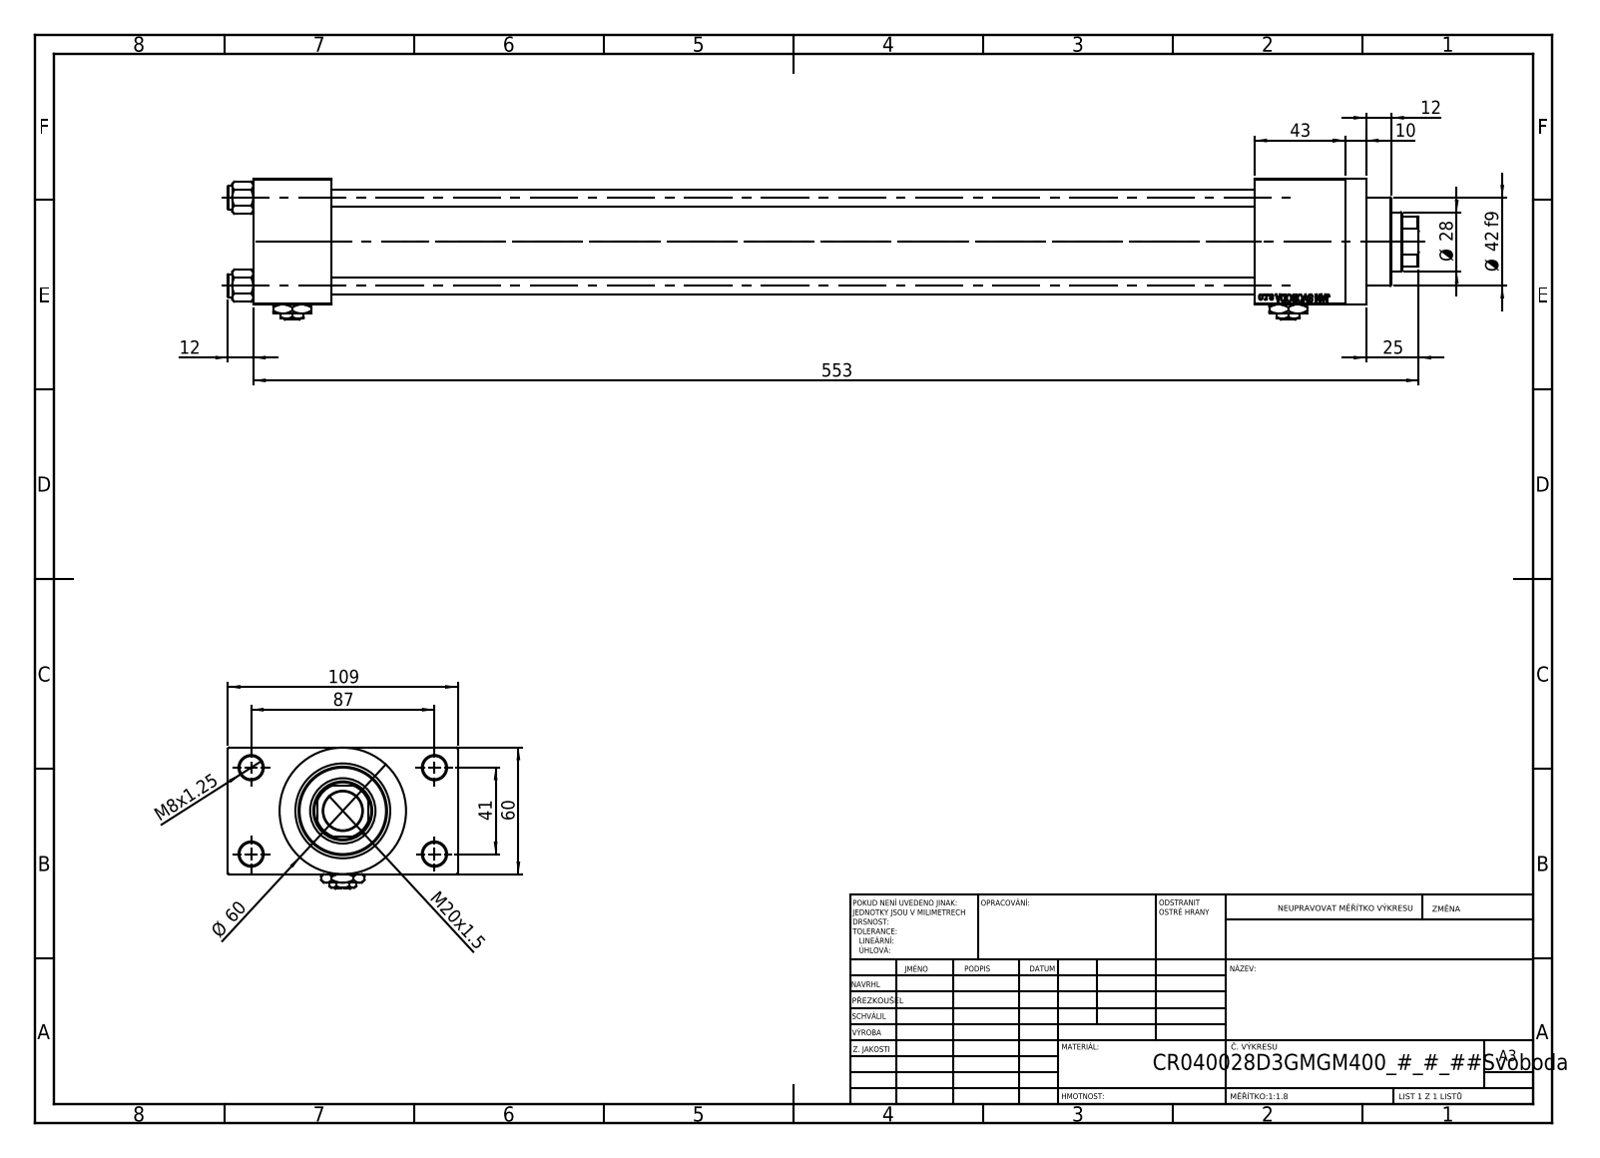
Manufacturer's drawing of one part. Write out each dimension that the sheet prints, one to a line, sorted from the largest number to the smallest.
553
109
87
Ø 60
60
43
Ø 42 f9
41
Ø 28
25
M20x1.5
12
12
10
M8x1.25
